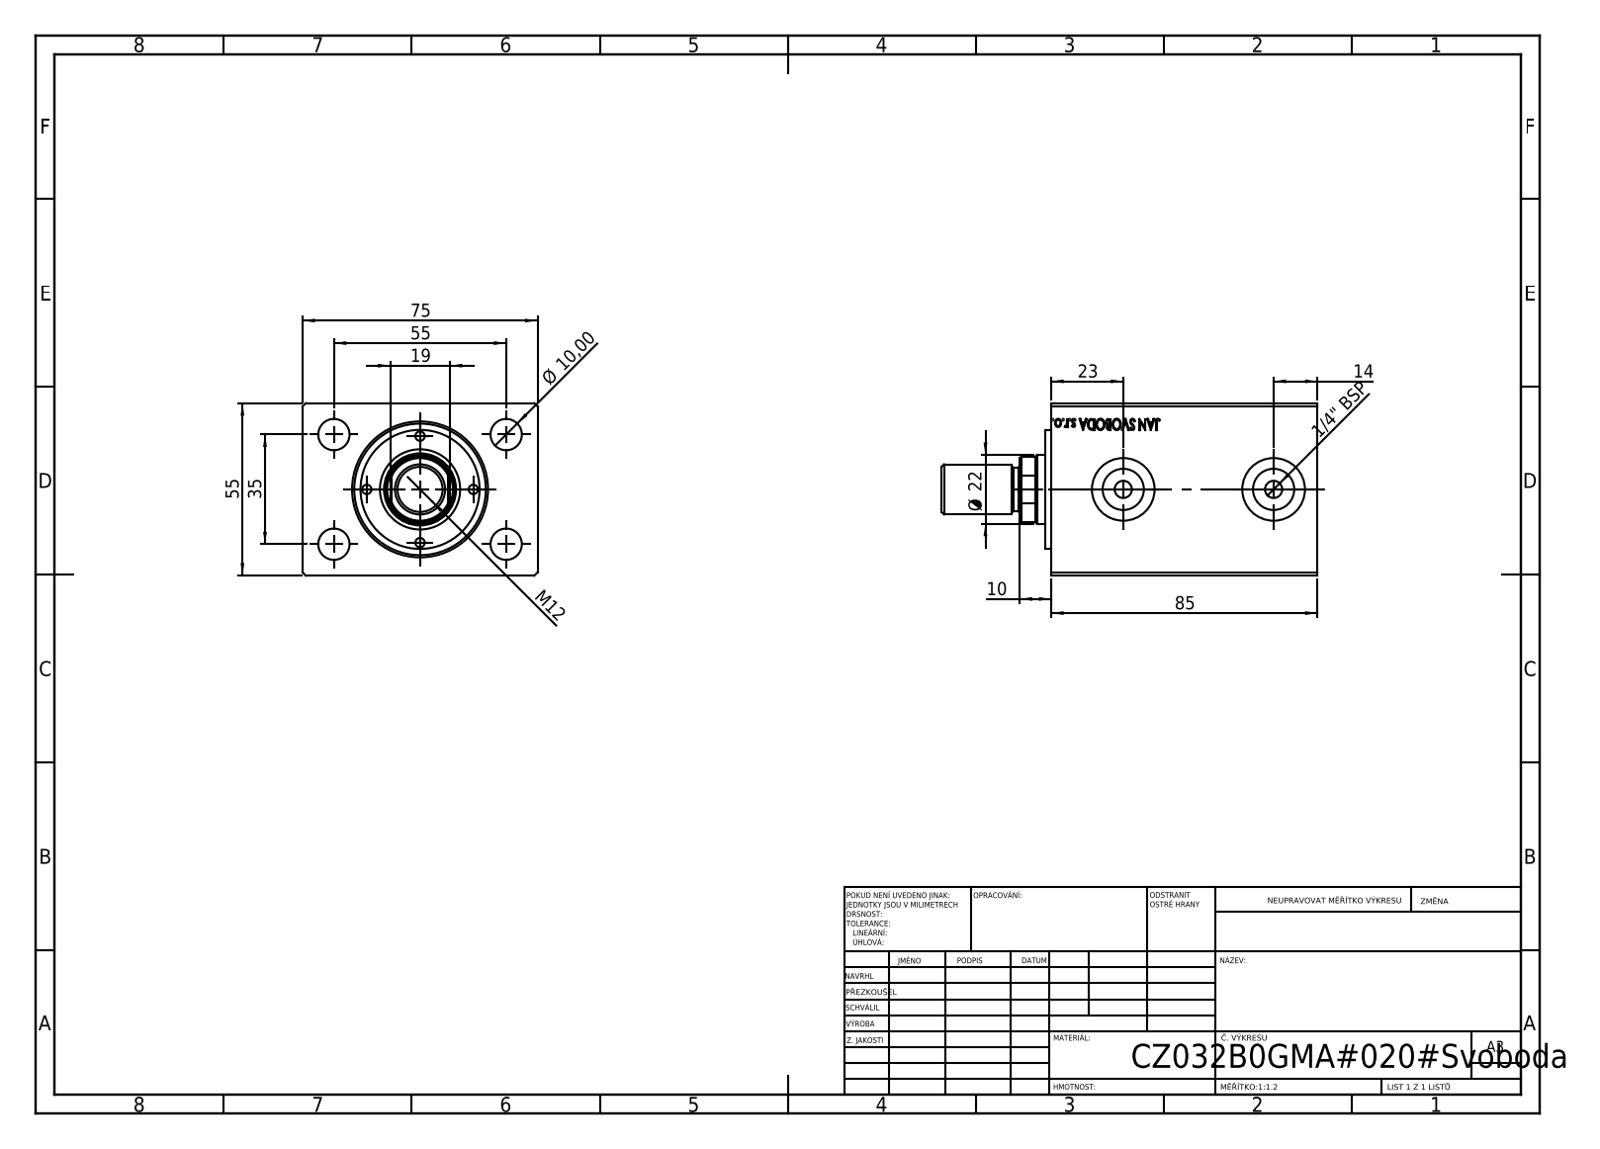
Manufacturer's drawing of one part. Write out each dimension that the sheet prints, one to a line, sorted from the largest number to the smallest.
85
75
55
55
35
23
Ø 22
19
14
M12
Ø 10,00
10
1/4" BSP
